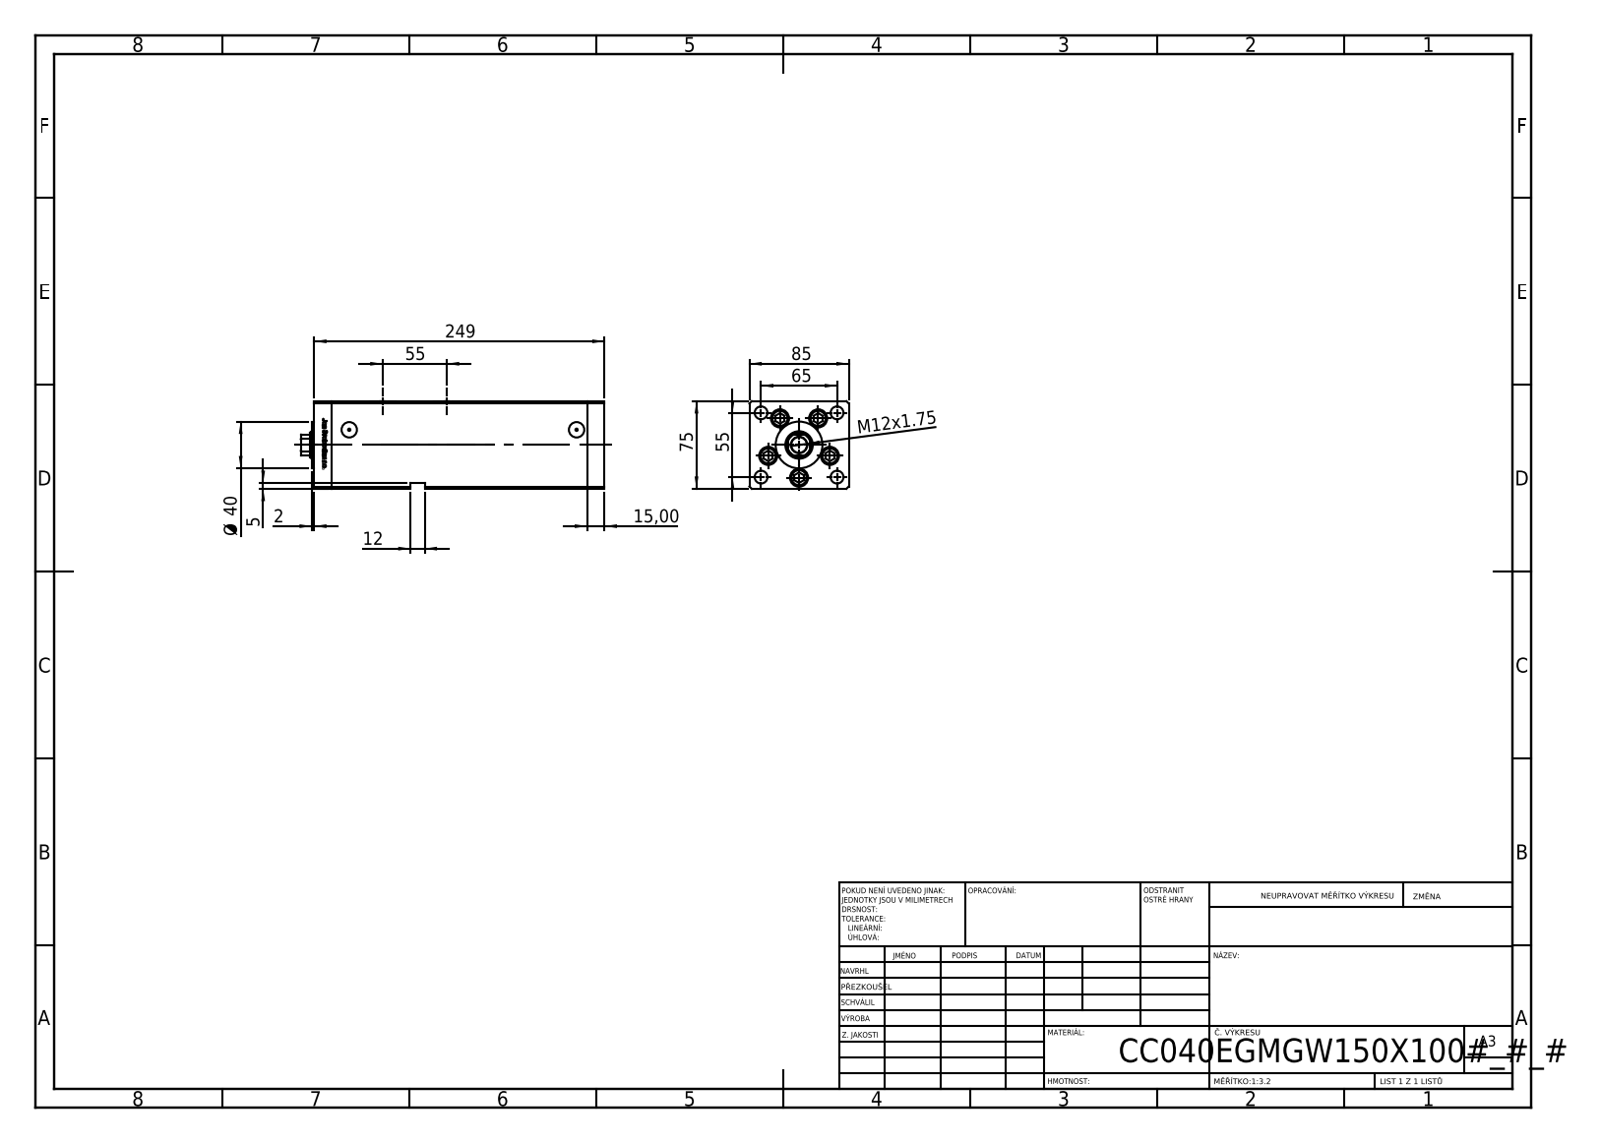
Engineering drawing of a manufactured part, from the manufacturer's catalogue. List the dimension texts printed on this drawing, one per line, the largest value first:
249
85
75
65
55
55
Ø 40
15,00
12
M12x1.75
5
2
